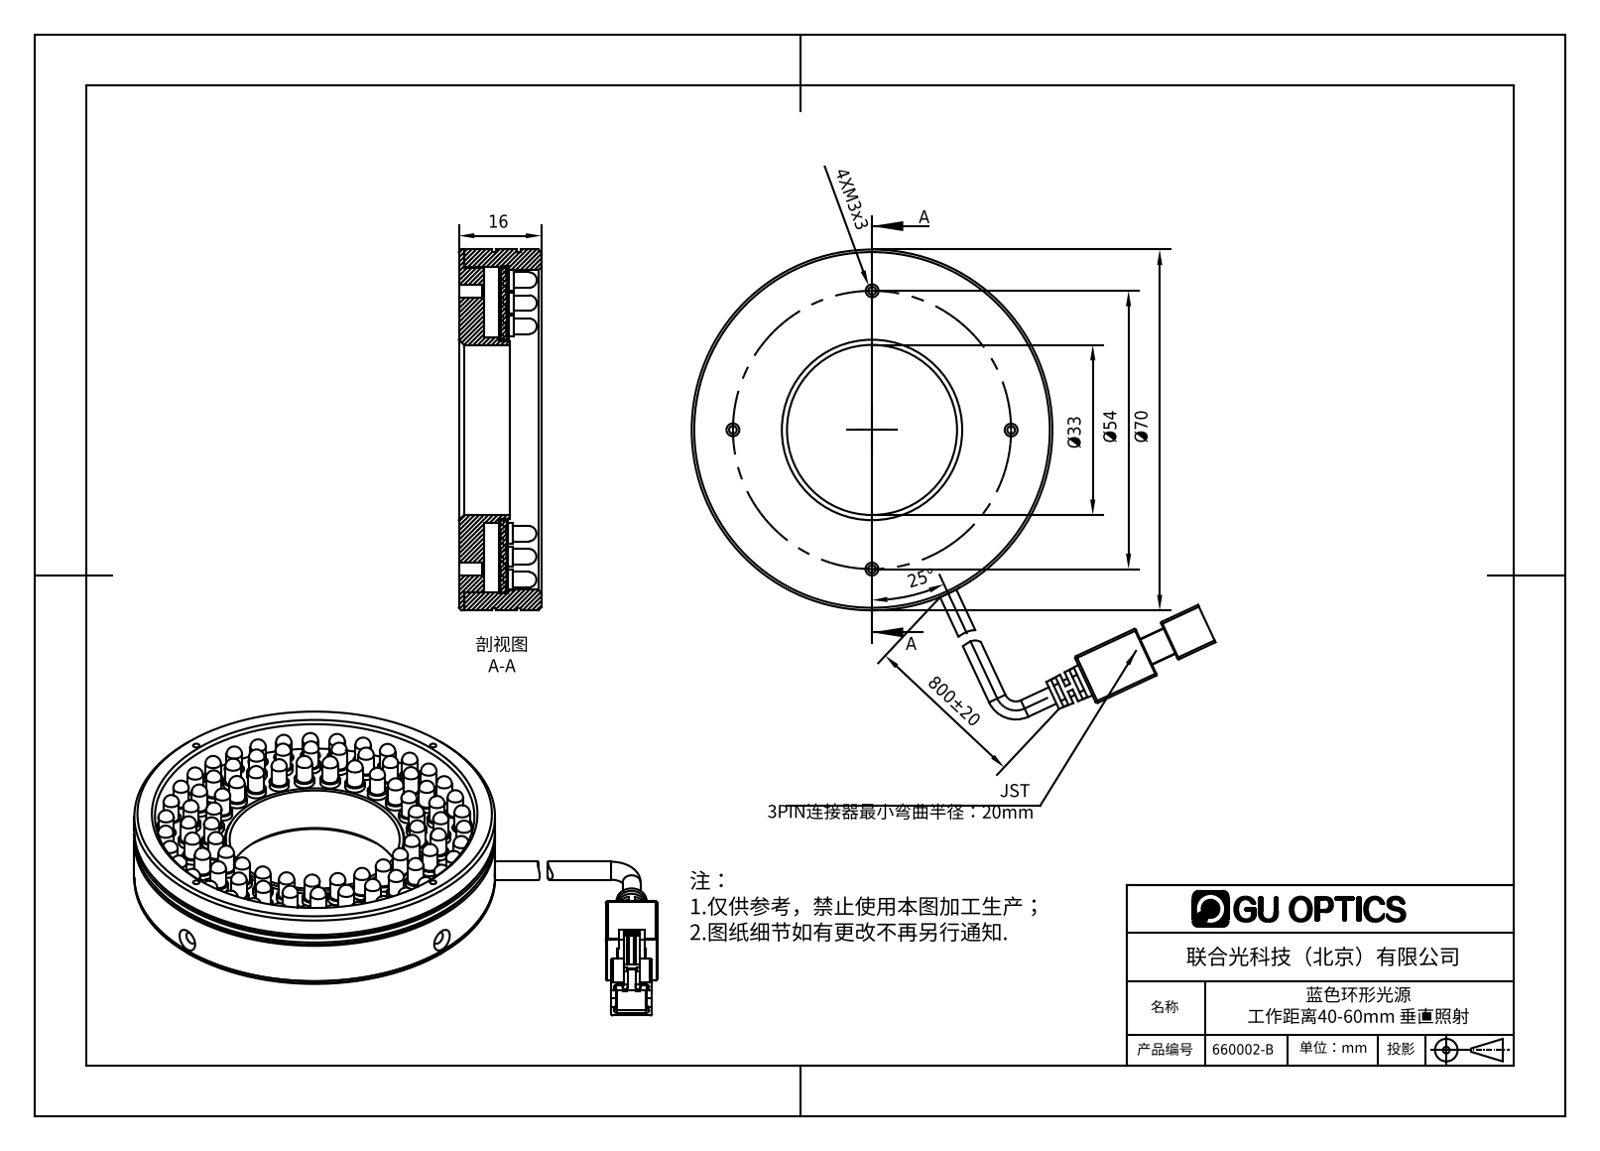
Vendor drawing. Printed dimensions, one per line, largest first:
Ø70
Ø54
Ø33
25°
16
4XM3x3
